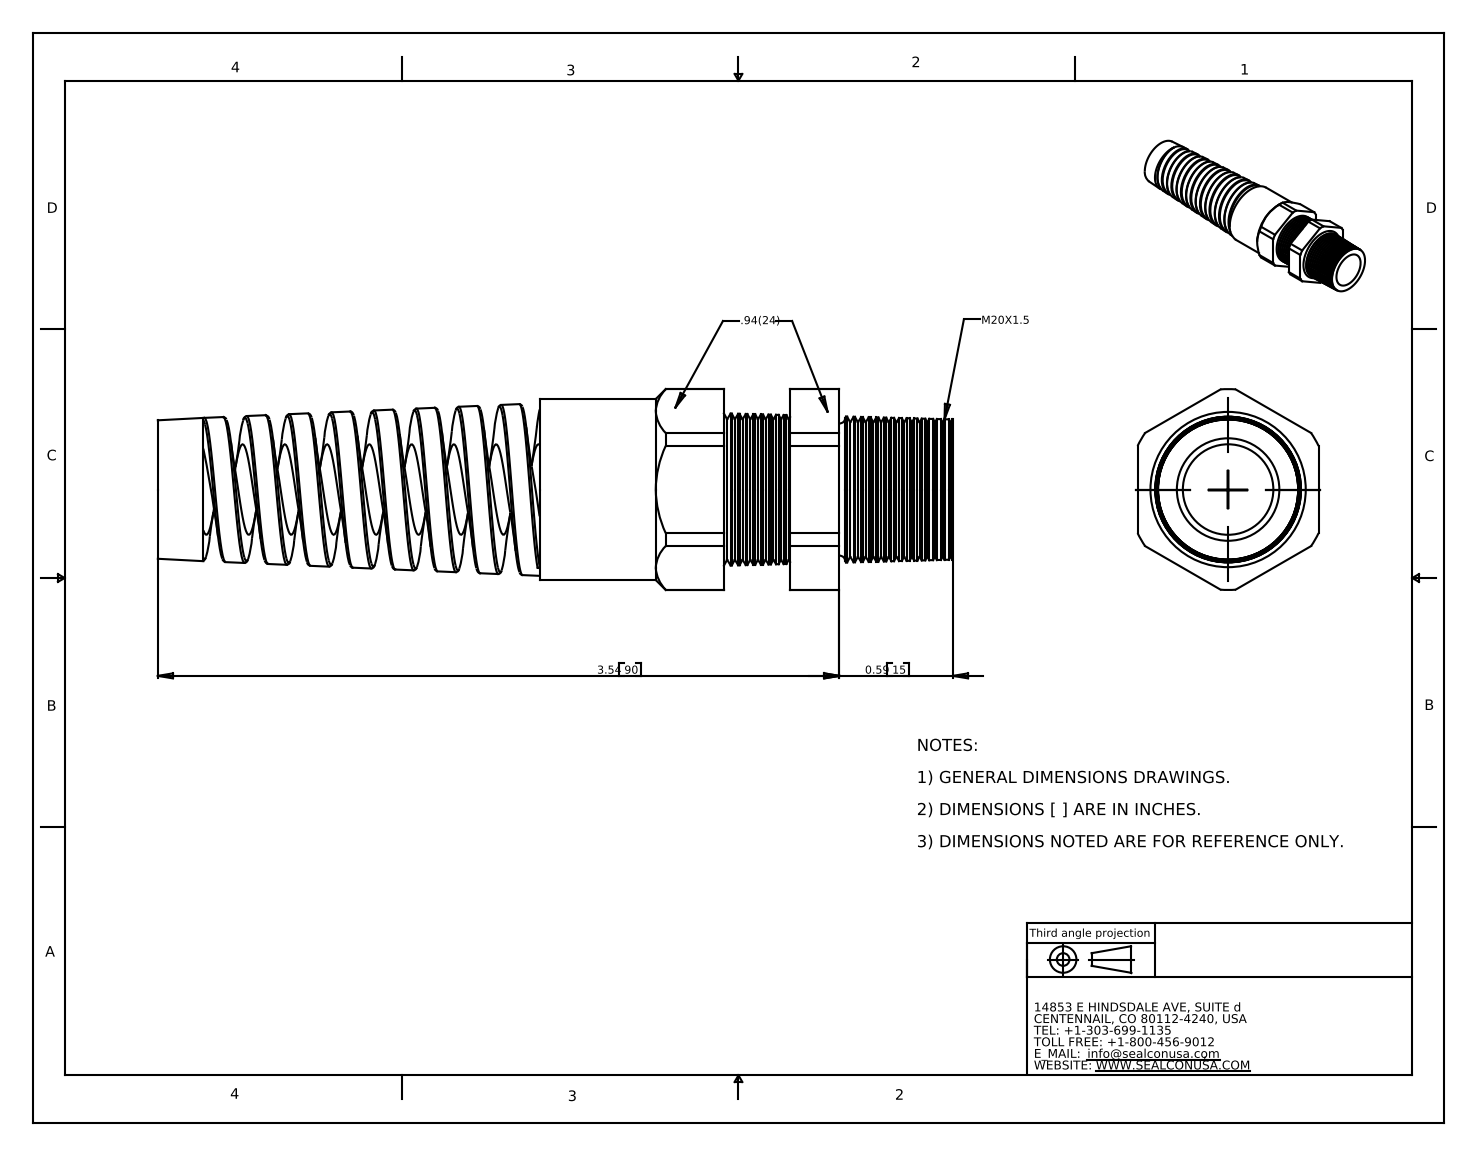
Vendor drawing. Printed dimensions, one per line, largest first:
3.54 90
0.59 15
